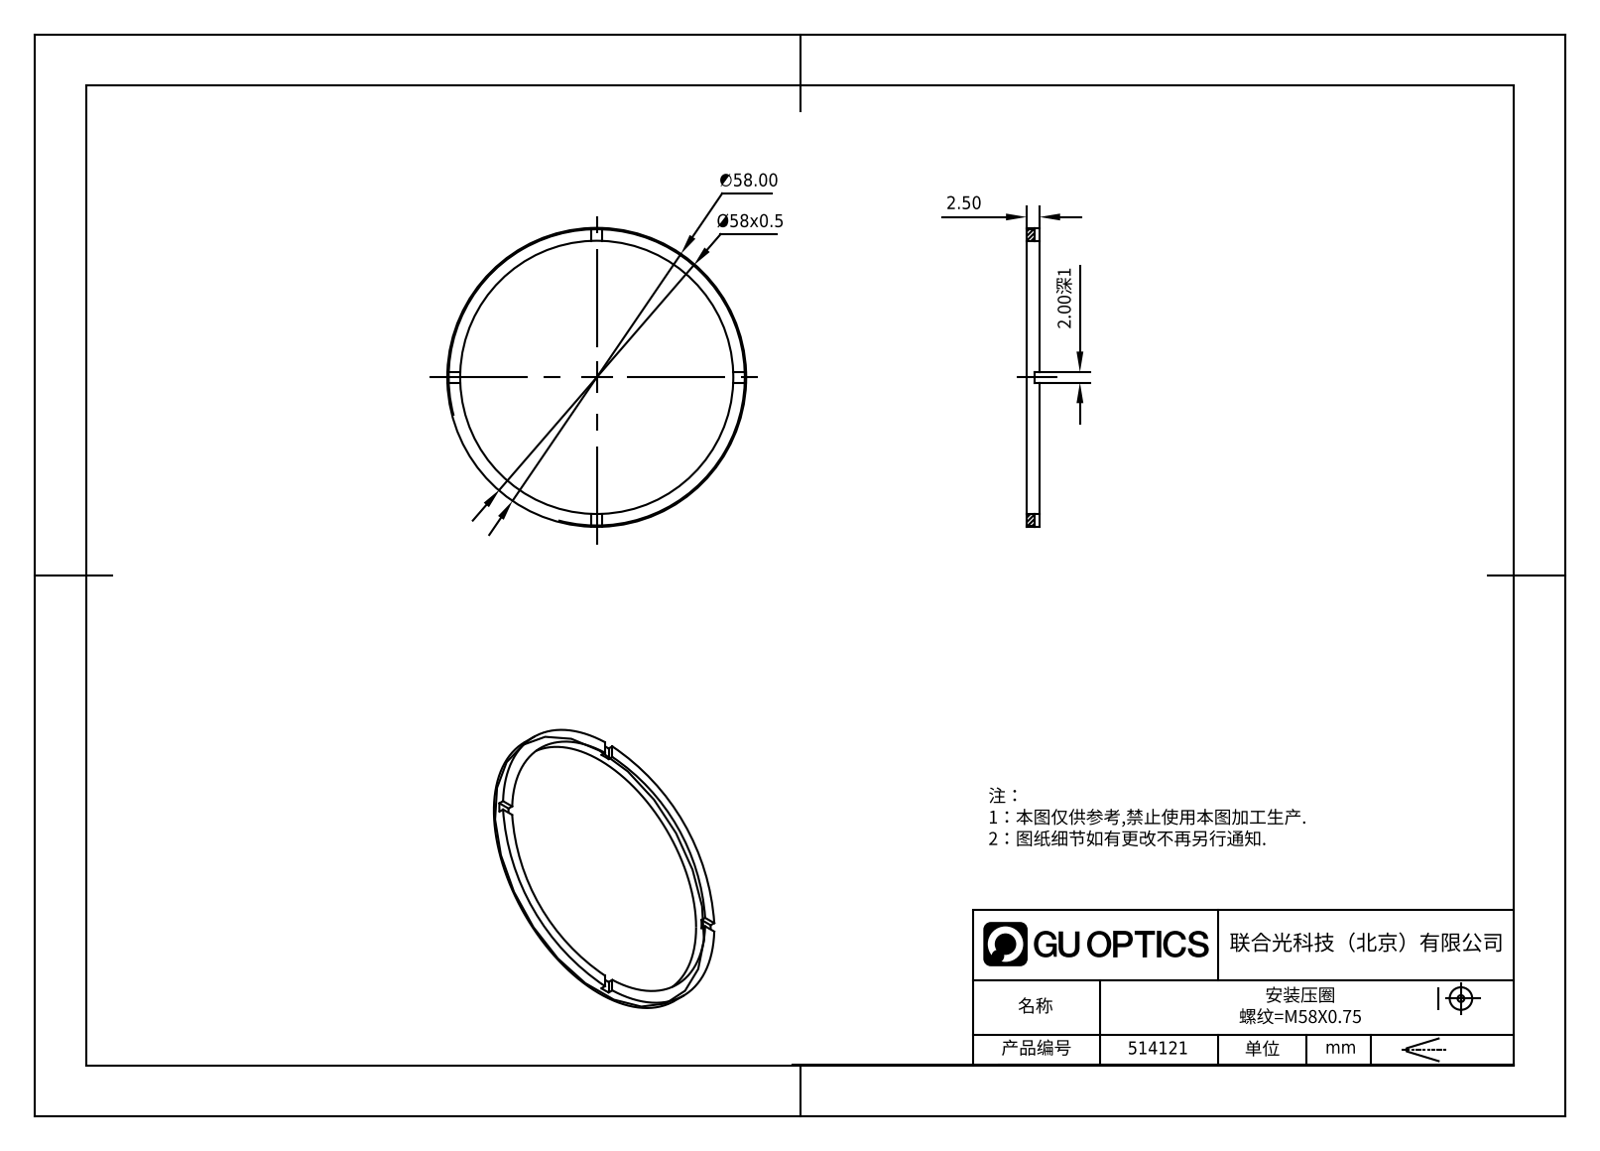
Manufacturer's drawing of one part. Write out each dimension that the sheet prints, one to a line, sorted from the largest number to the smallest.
∅58.00
Ø58x0.5
2.50
2.00深1
